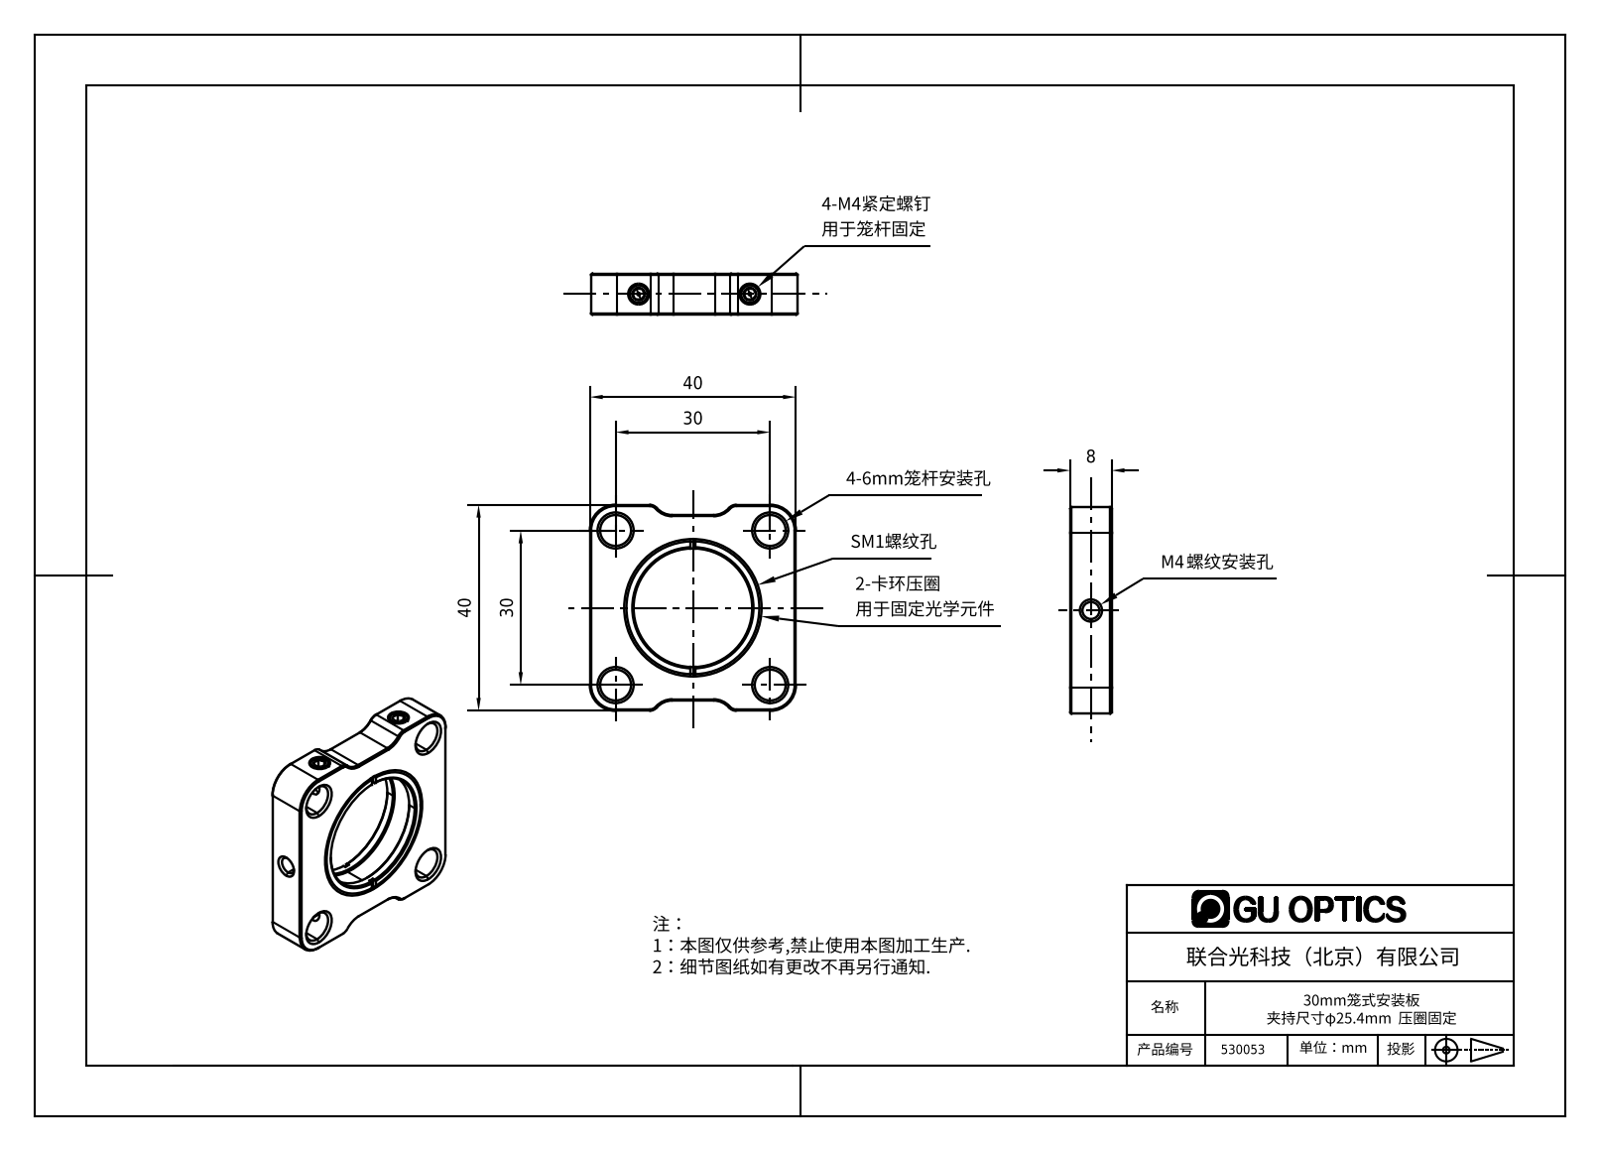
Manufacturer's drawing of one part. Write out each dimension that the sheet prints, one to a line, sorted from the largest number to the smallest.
40
40
30
30
8
